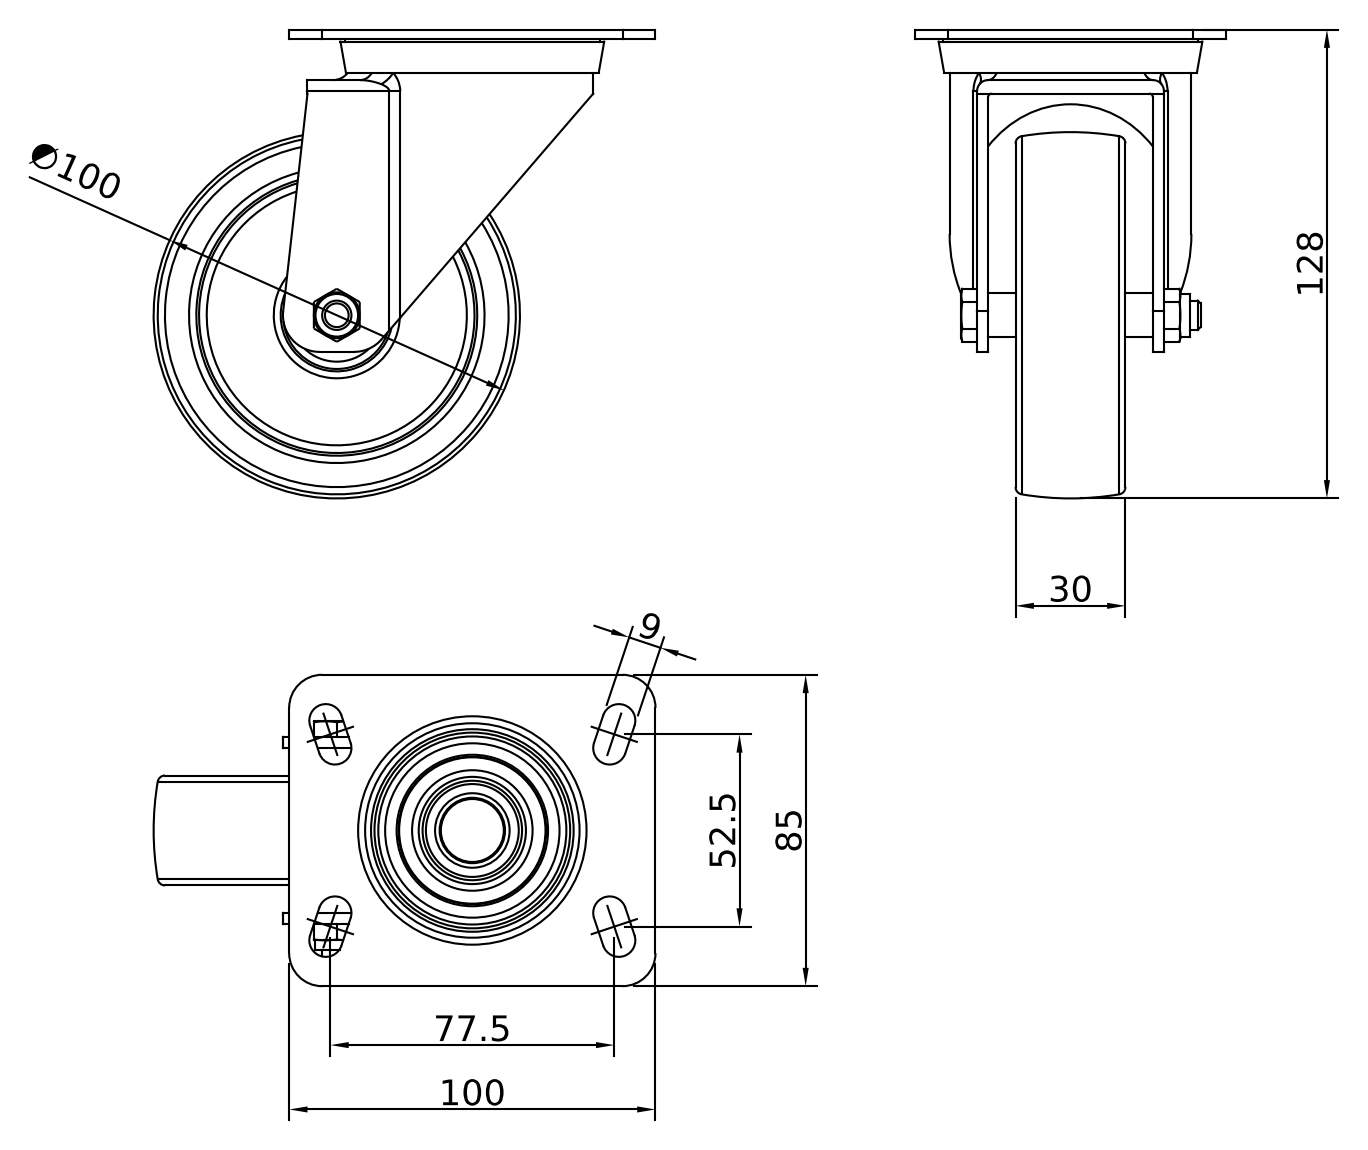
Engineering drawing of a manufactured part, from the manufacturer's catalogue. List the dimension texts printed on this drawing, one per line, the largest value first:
128
∅100
100
85
77.5
52.5
30
9
